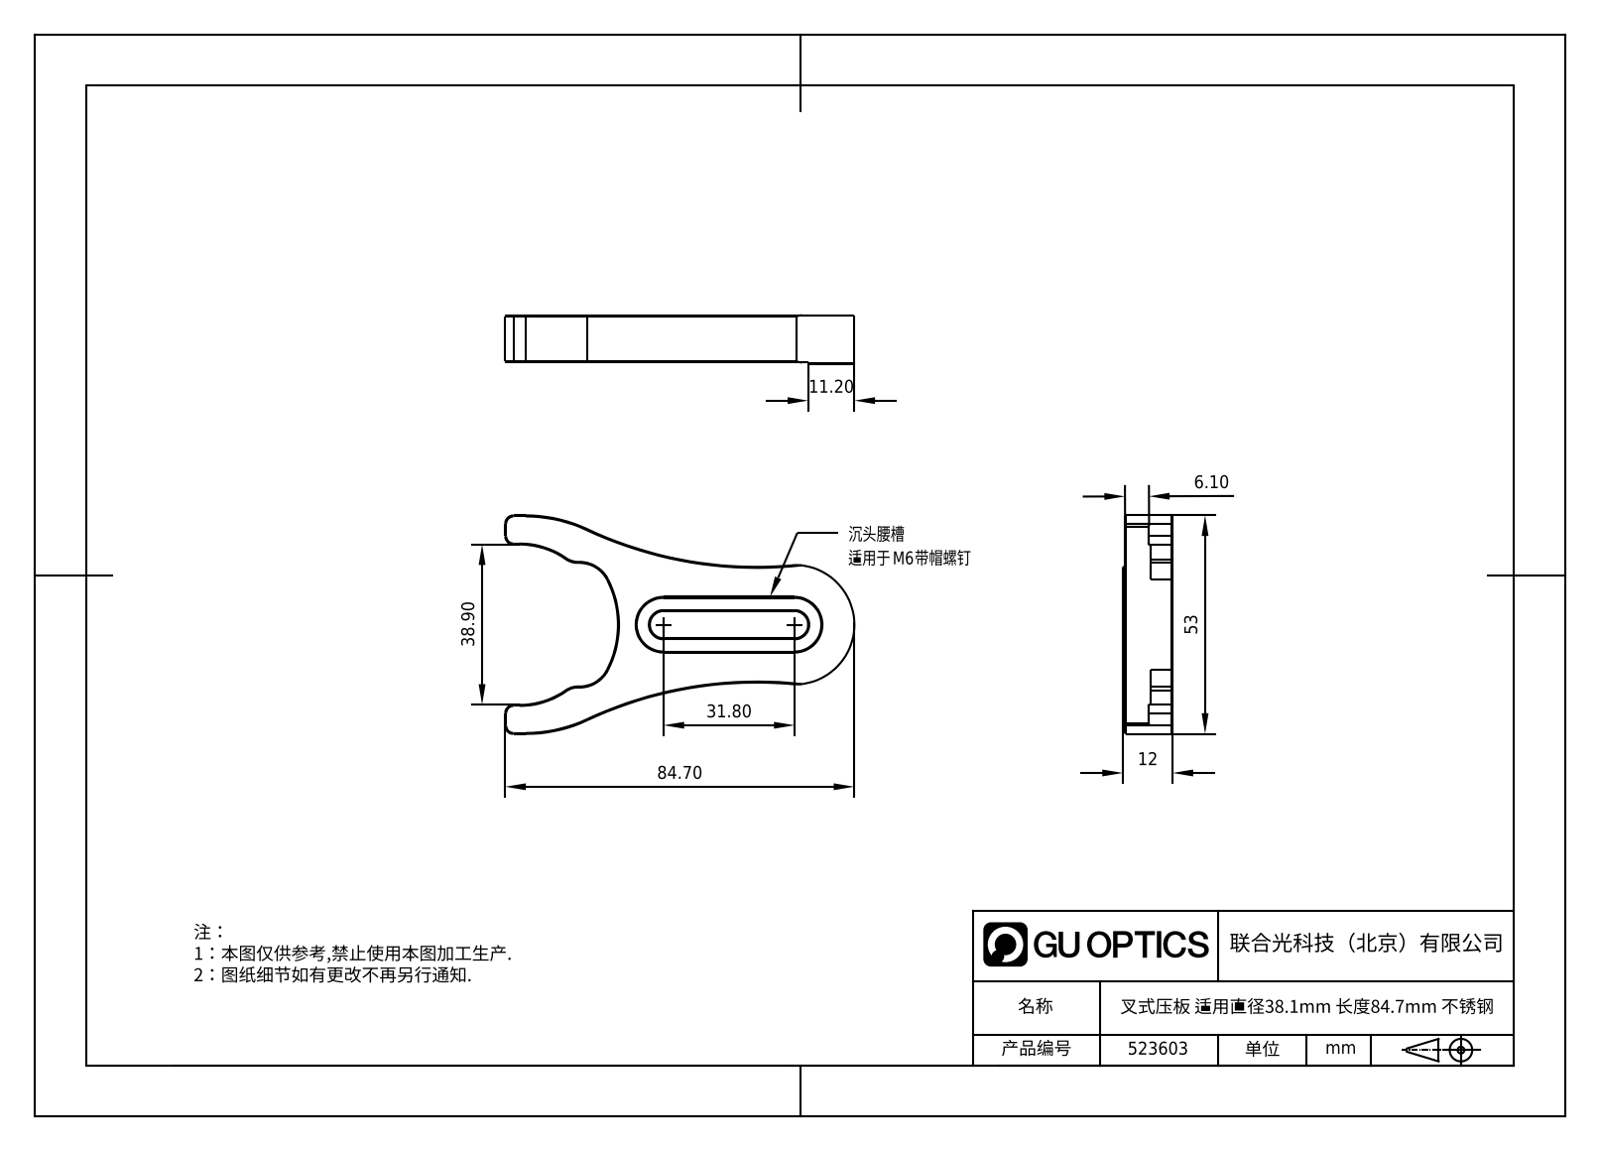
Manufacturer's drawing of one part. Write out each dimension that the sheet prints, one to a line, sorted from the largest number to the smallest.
84.70
53
38.90
31.80
12
11.20
6.10
